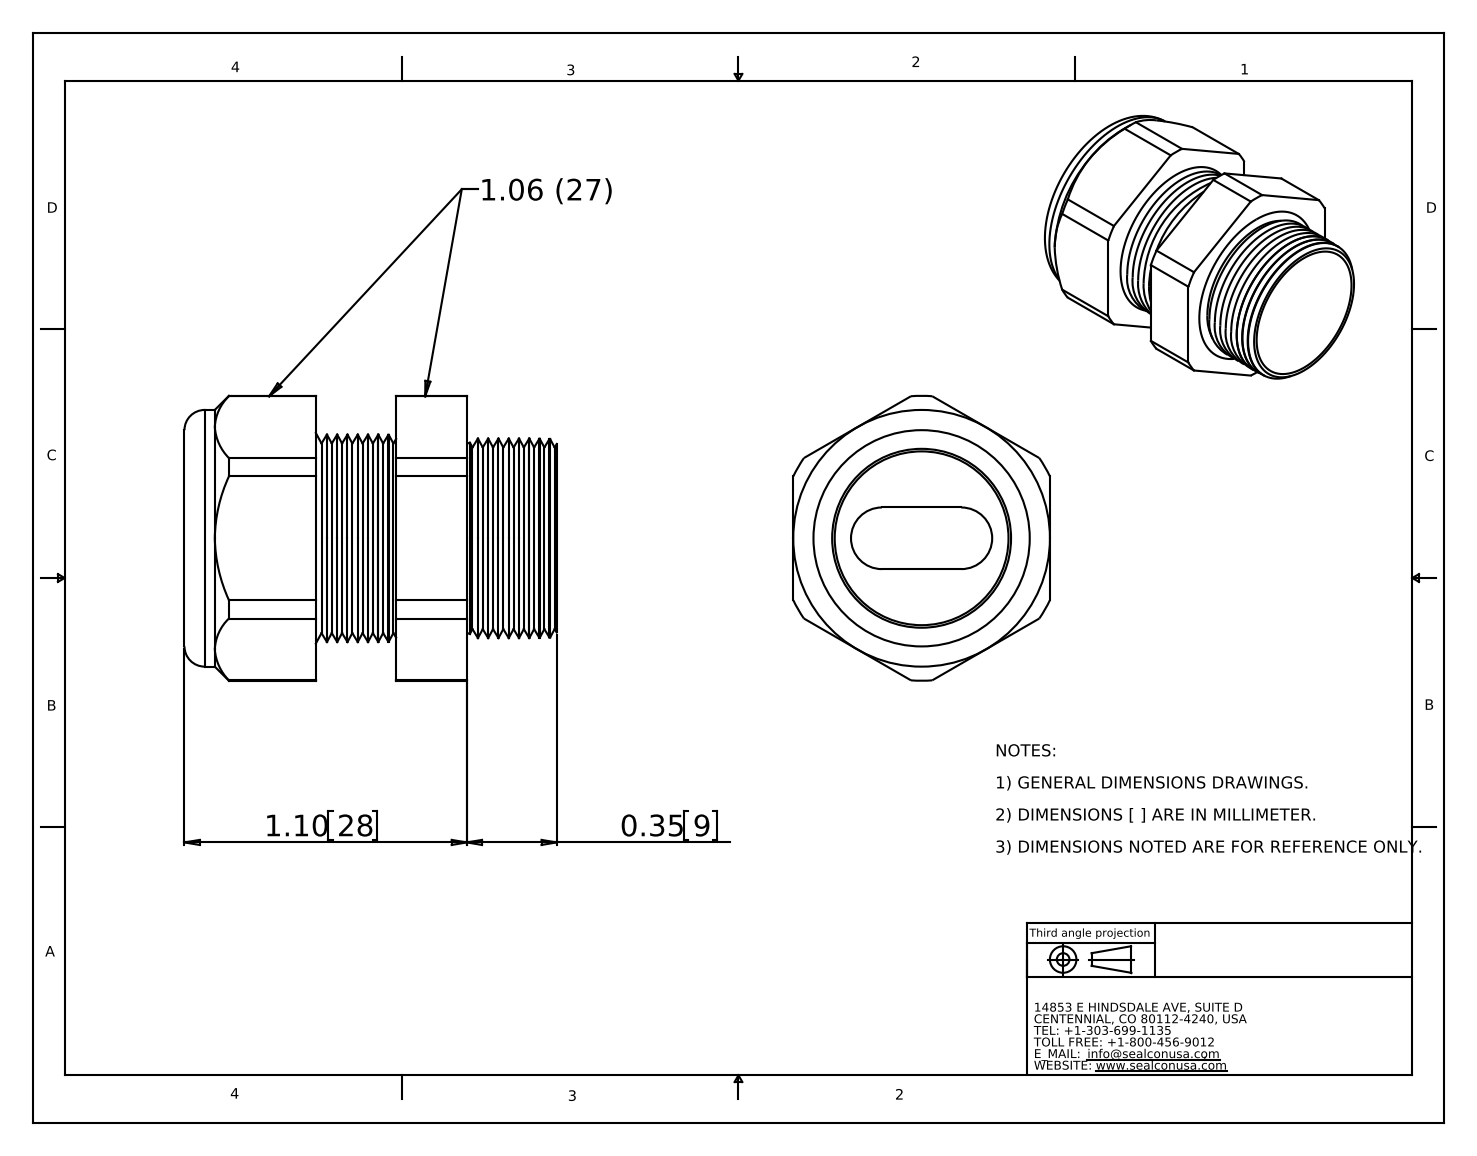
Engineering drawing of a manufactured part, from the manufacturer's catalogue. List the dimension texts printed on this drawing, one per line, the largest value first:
1.10 28
0.35 9
